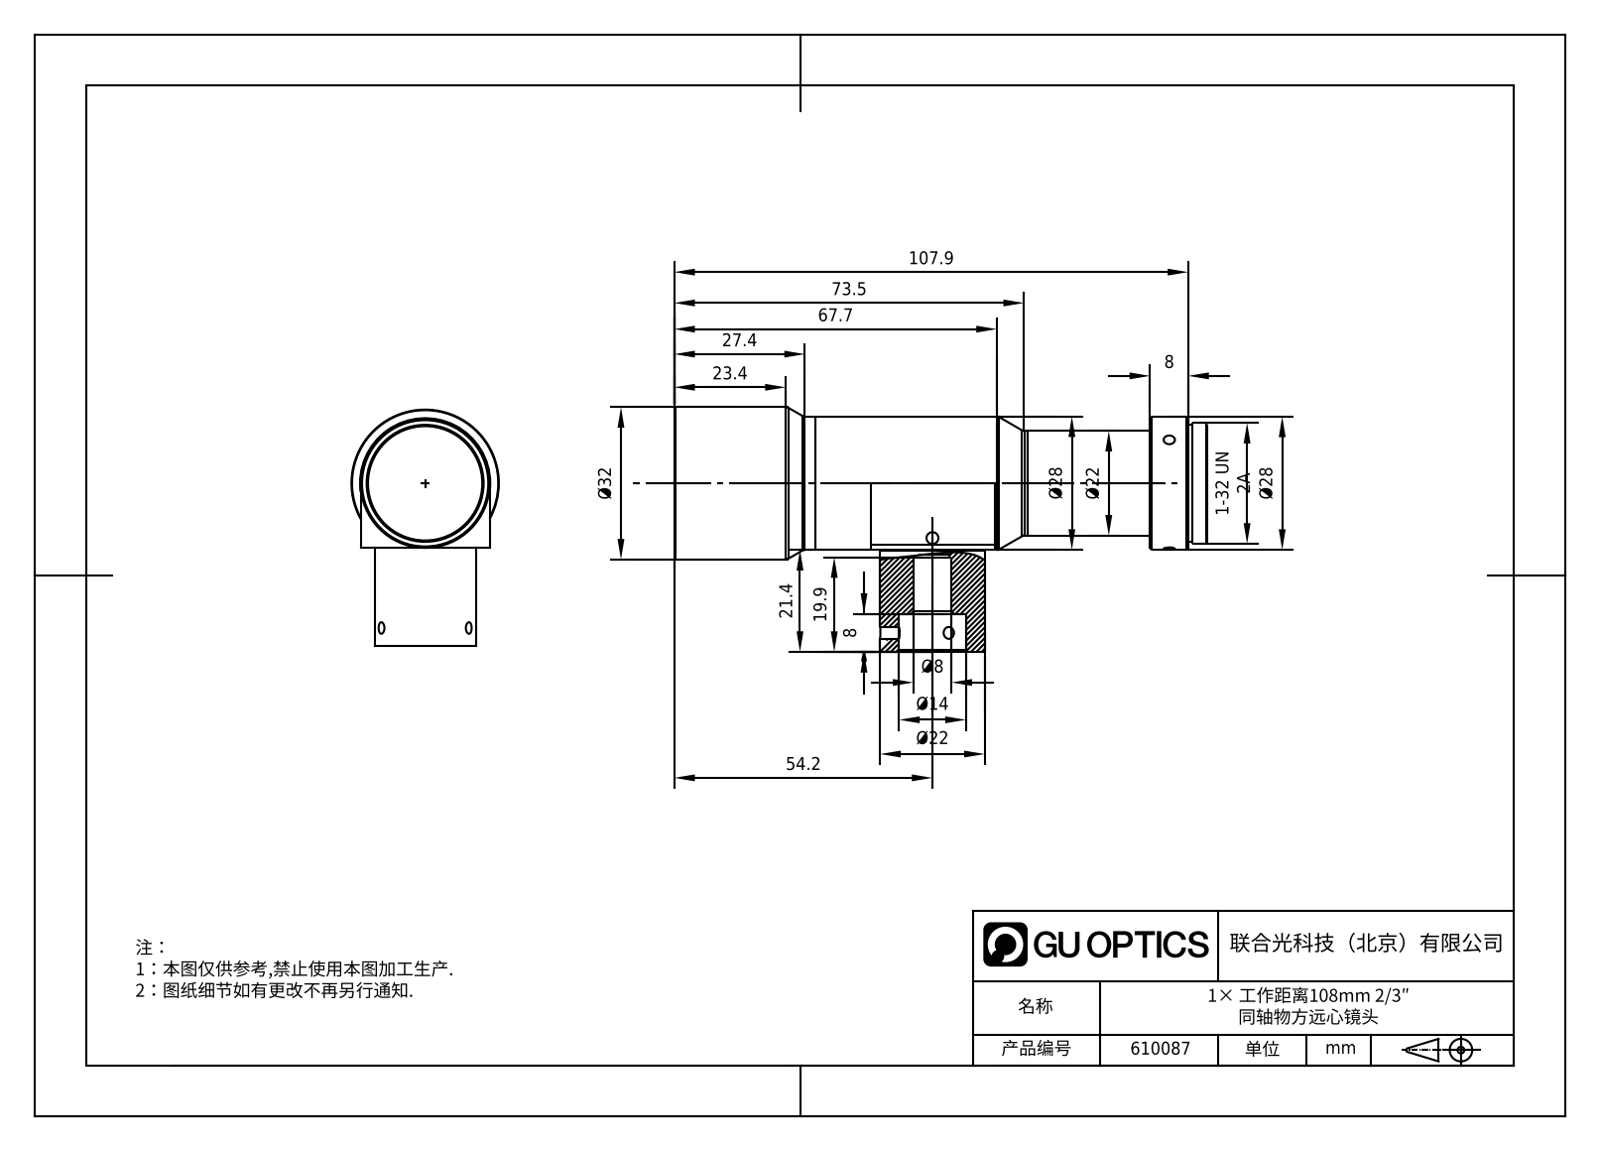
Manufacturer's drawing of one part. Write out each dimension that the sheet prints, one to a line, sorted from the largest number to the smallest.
107.9
73.5
67.7
54.2
Ø32
Ø28
Ø28
27.4
23.4
Ø22
Ø22
21.4
19.9
Ø14
Ø8
8
8
1-32 UN 2A
